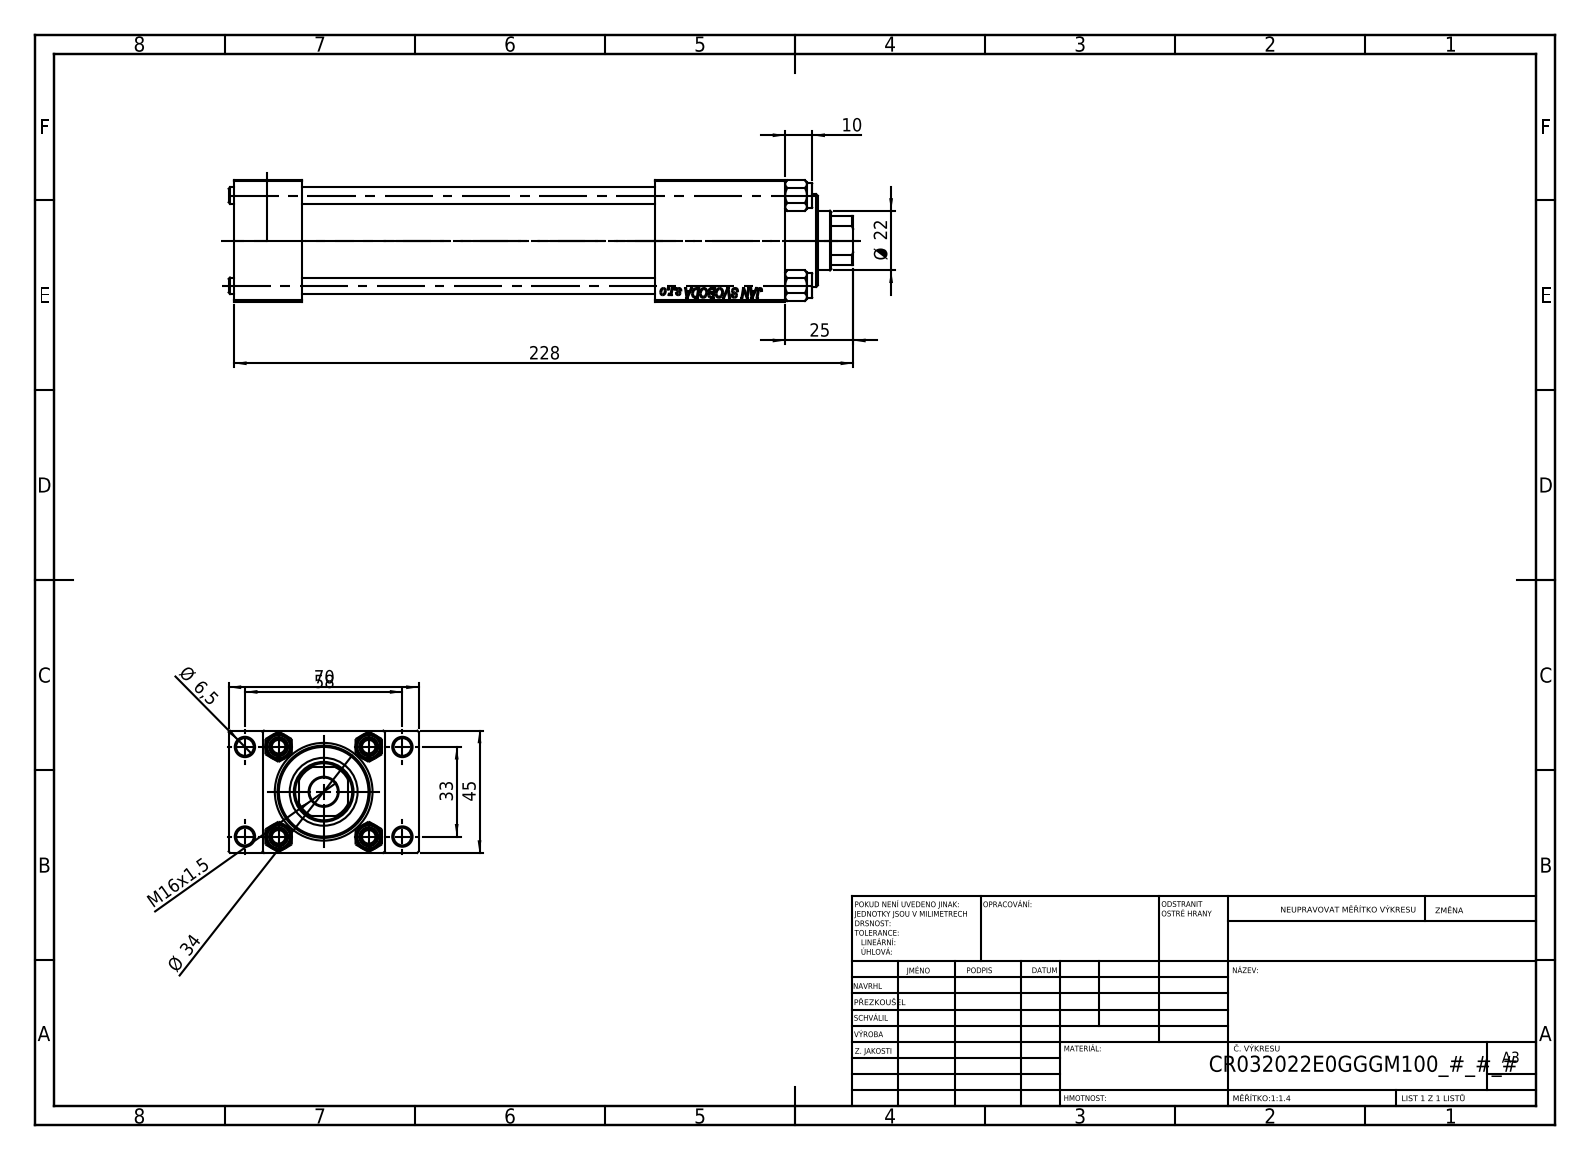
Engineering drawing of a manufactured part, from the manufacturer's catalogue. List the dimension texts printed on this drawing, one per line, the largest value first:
228
70
58
45
Ø 34
33
25
Ø 22
M16x1.5
10
Ø 6,5
